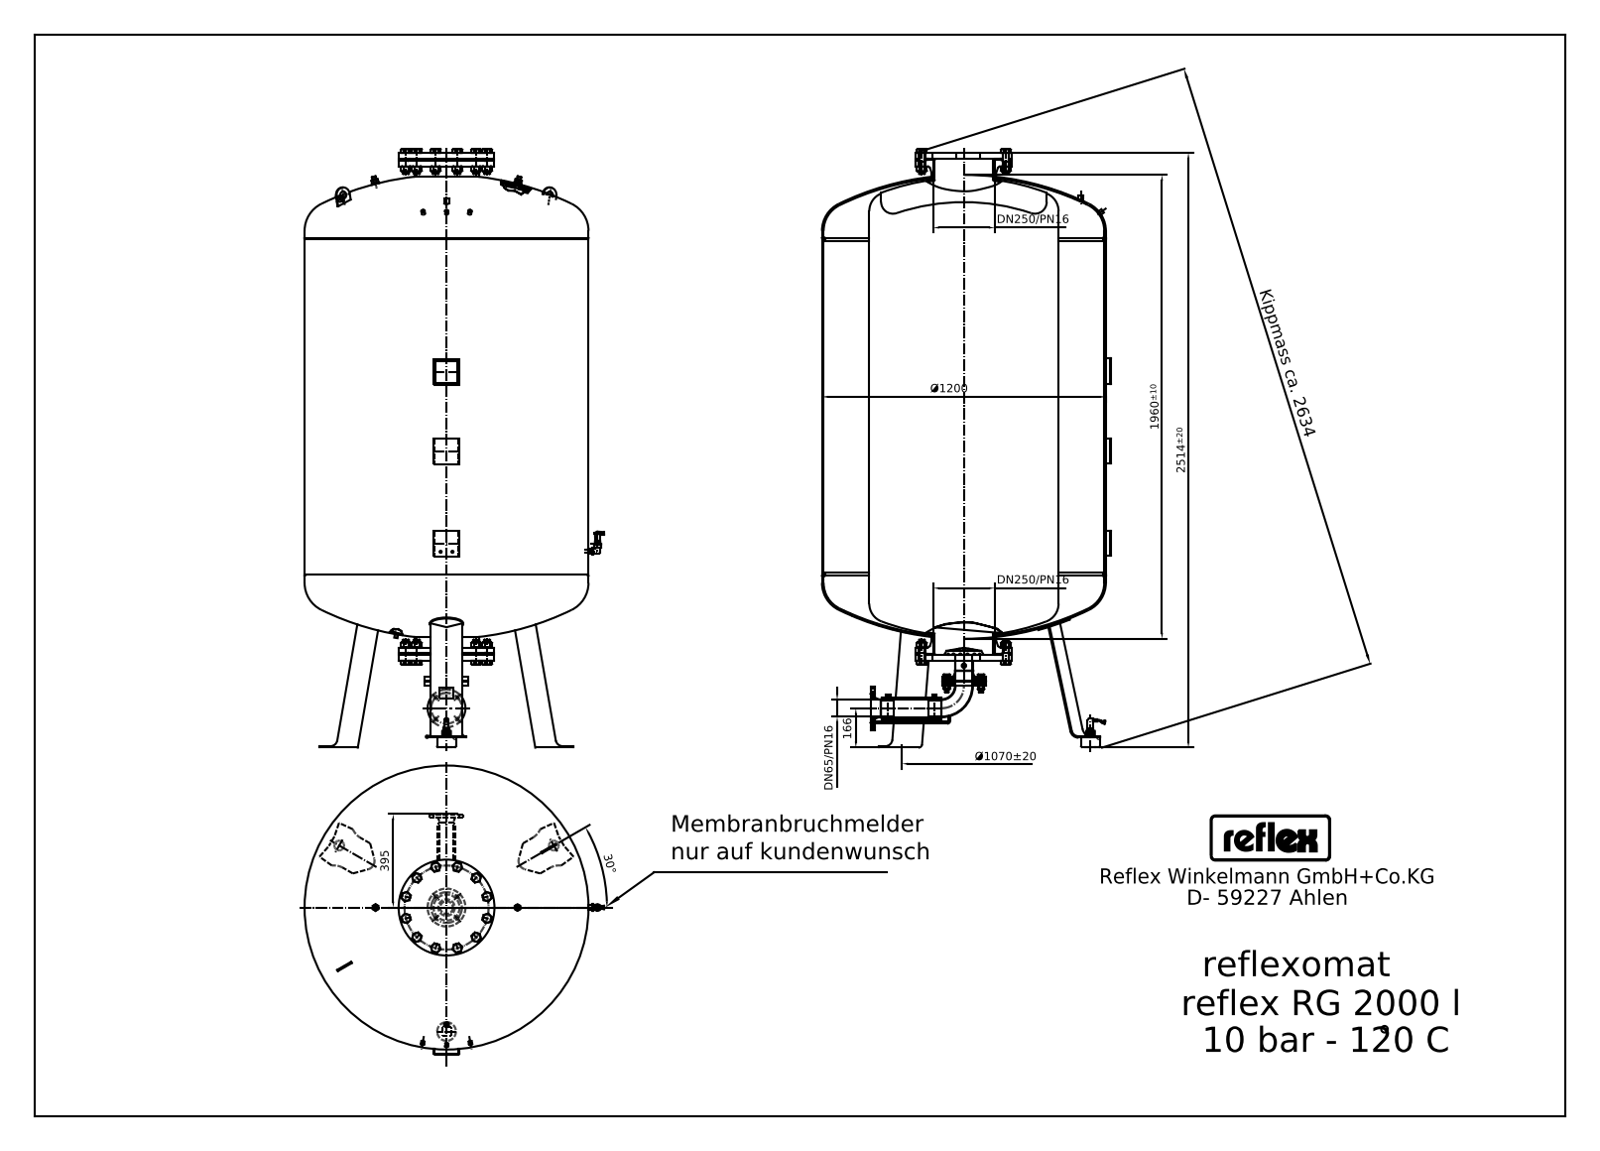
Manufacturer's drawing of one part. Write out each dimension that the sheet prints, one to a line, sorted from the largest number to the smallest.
Kippmass ca. 2634
2514±20
1960±10
Ø1200
Ø1070±20
395
DN250/PN16
DN250/PN16
166
DN65/PN16
30°
